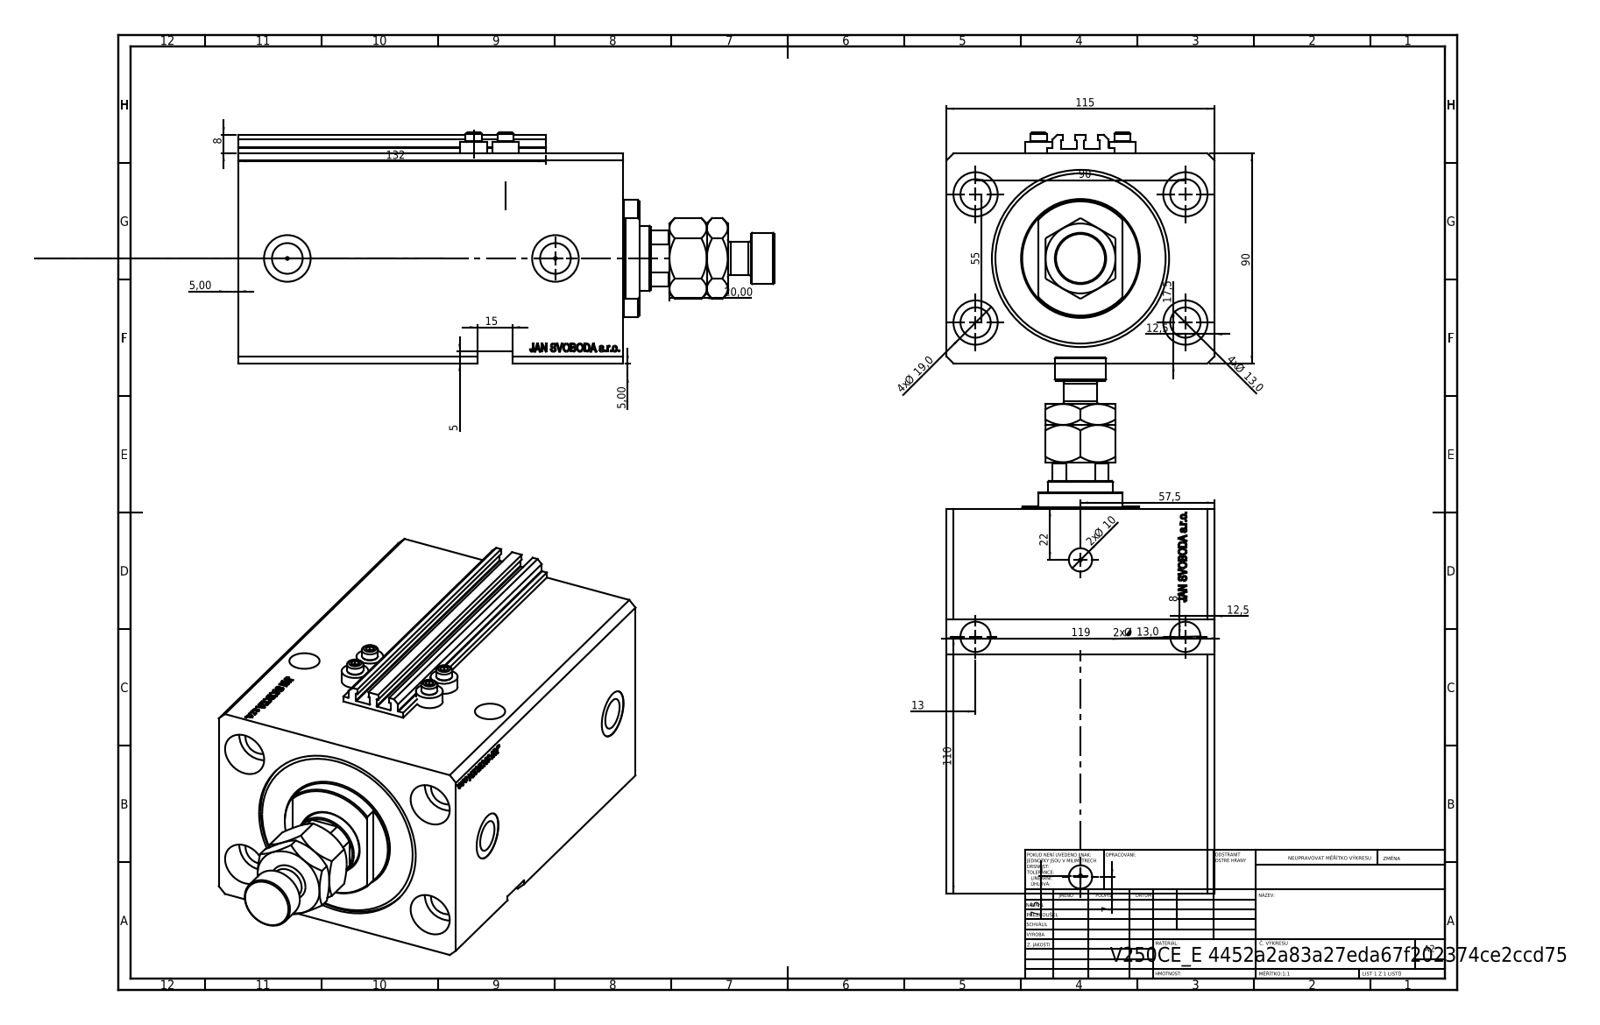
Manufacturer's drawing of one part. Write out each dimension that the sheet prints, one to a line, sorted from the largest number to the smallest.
132
119
115
110
90
90
57,5
55
22
20,00
4x Ø 19,0
17,5
15
4x Ø 13,0
2x Ø 13,0
13
12,5
12,5
2x Ø 10
8
8
7,5
7
5,00
5,00
5
